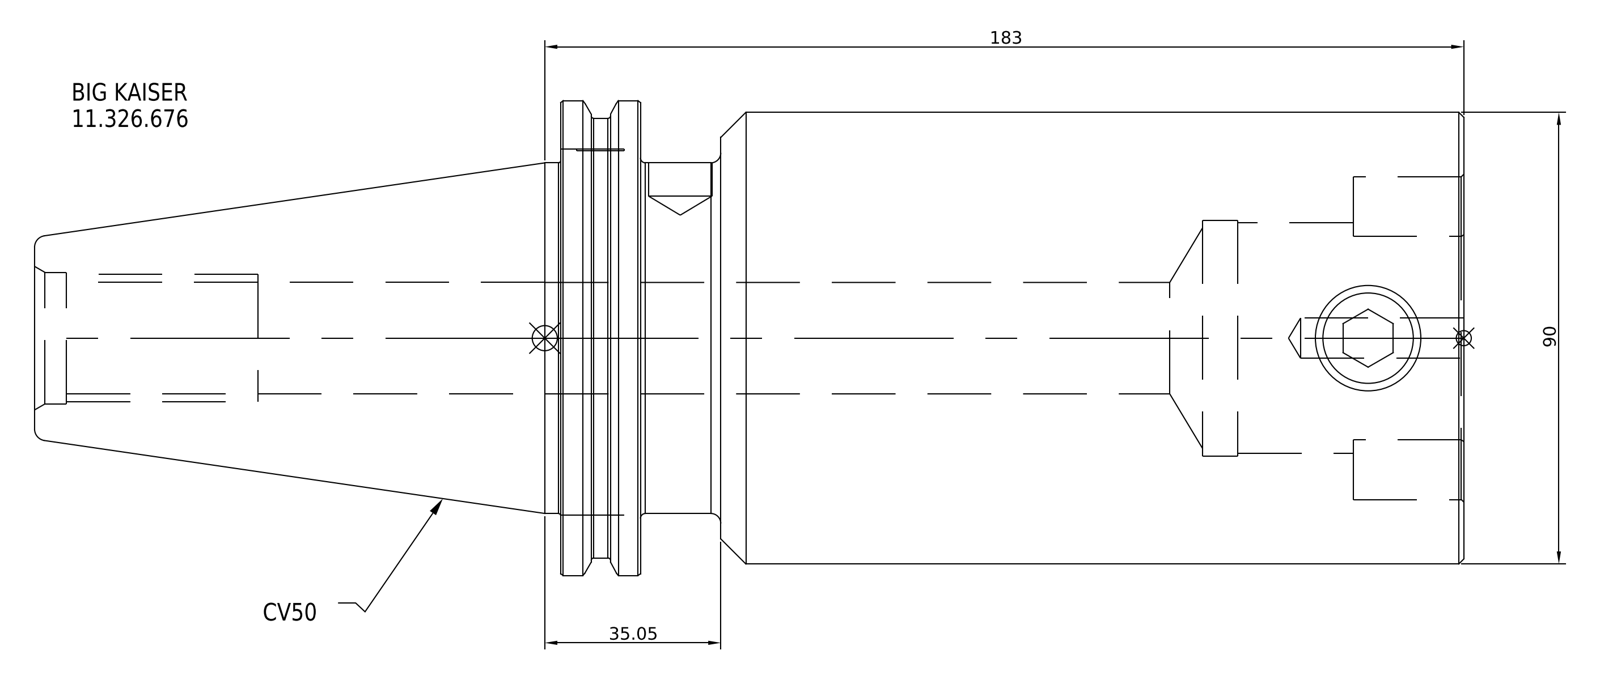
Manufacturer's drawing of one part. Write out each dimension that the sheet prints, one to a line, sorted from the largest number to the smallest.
183
90
35.05
